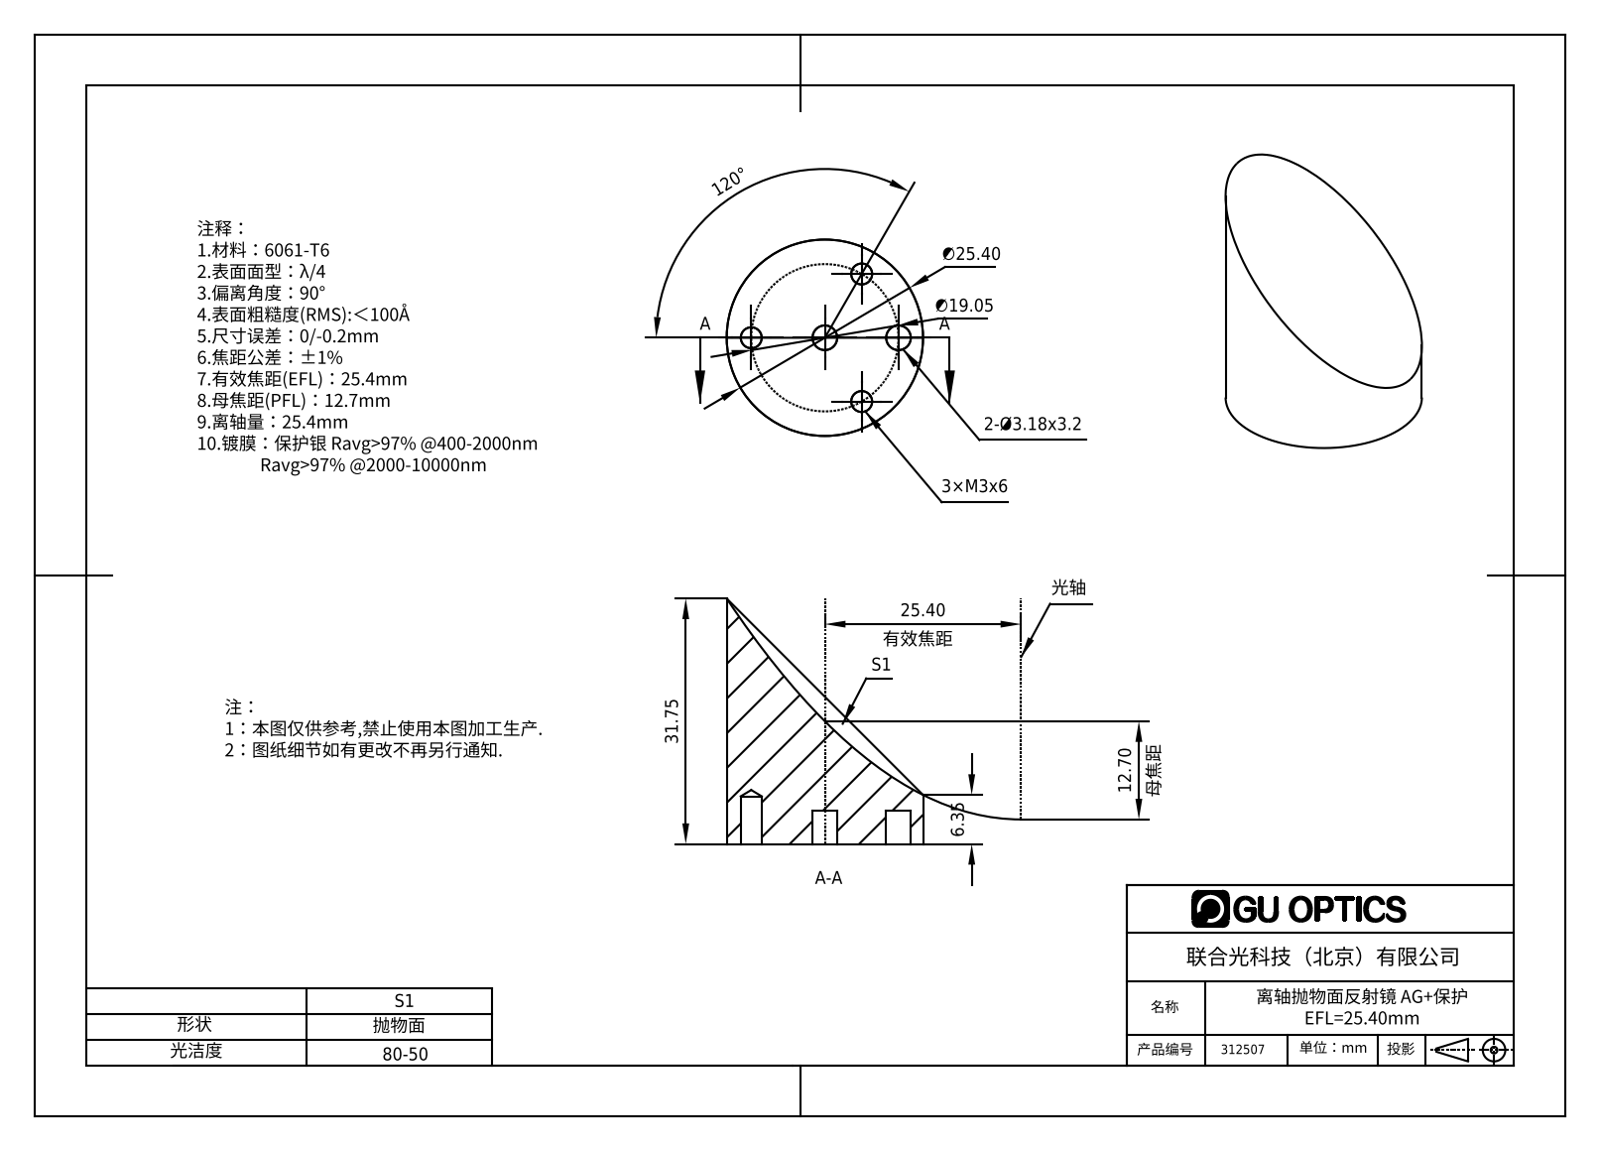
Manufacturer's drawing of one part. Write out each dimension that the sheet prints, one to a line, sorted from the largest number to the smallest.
120°
31.75
∅25.40
25.40
∅19.05
12.70
6.35
